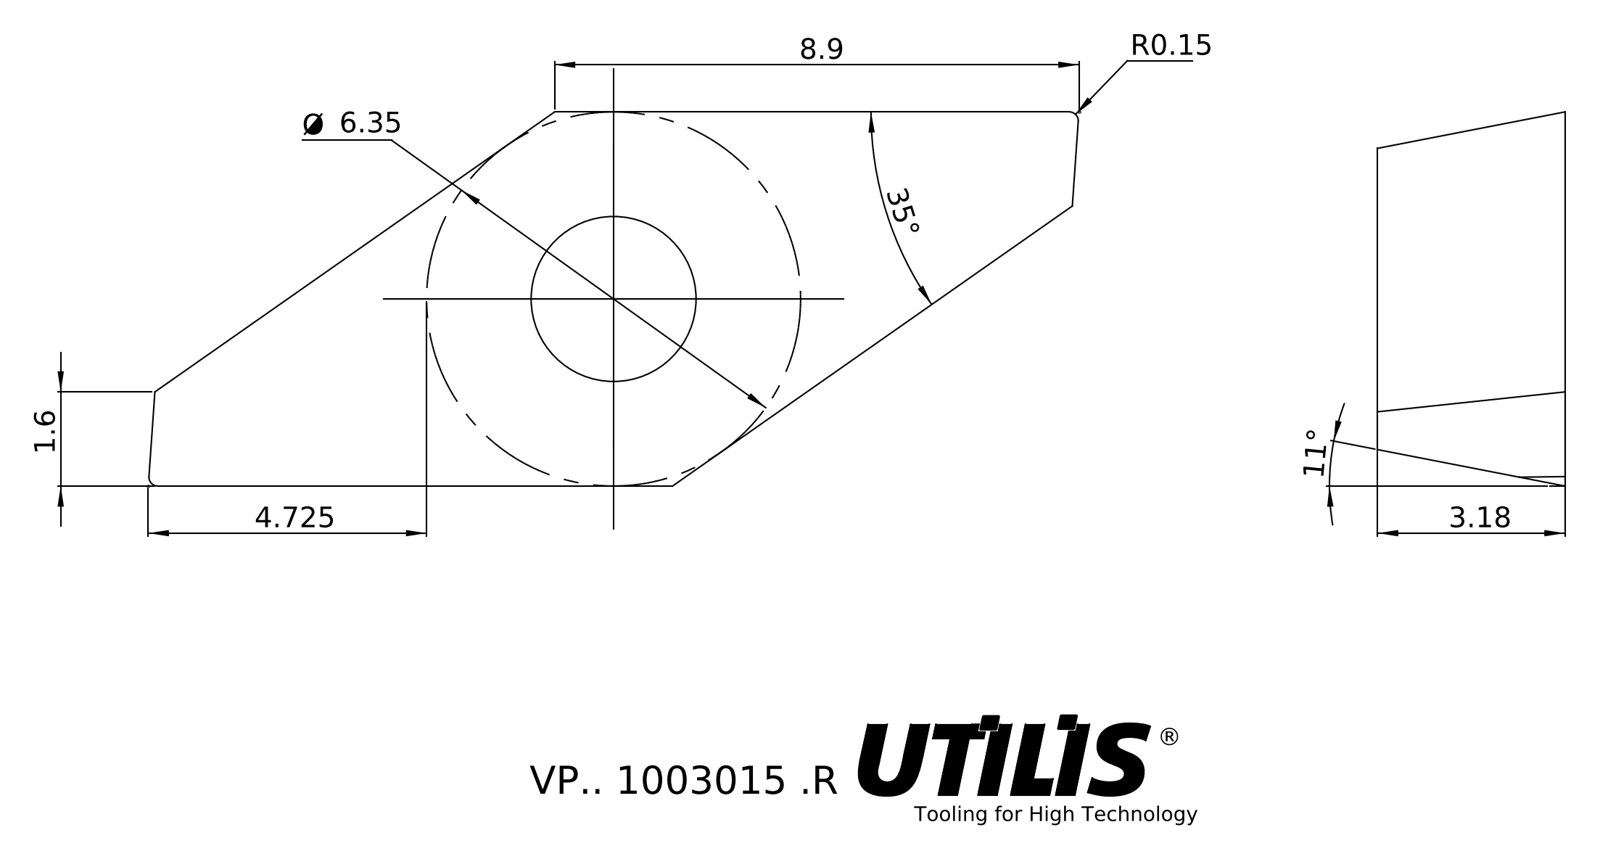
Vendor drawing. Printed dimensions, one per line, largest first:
35°
11°
8.9
Ø 6.35
4.725
3.18
1.6
R0.15
